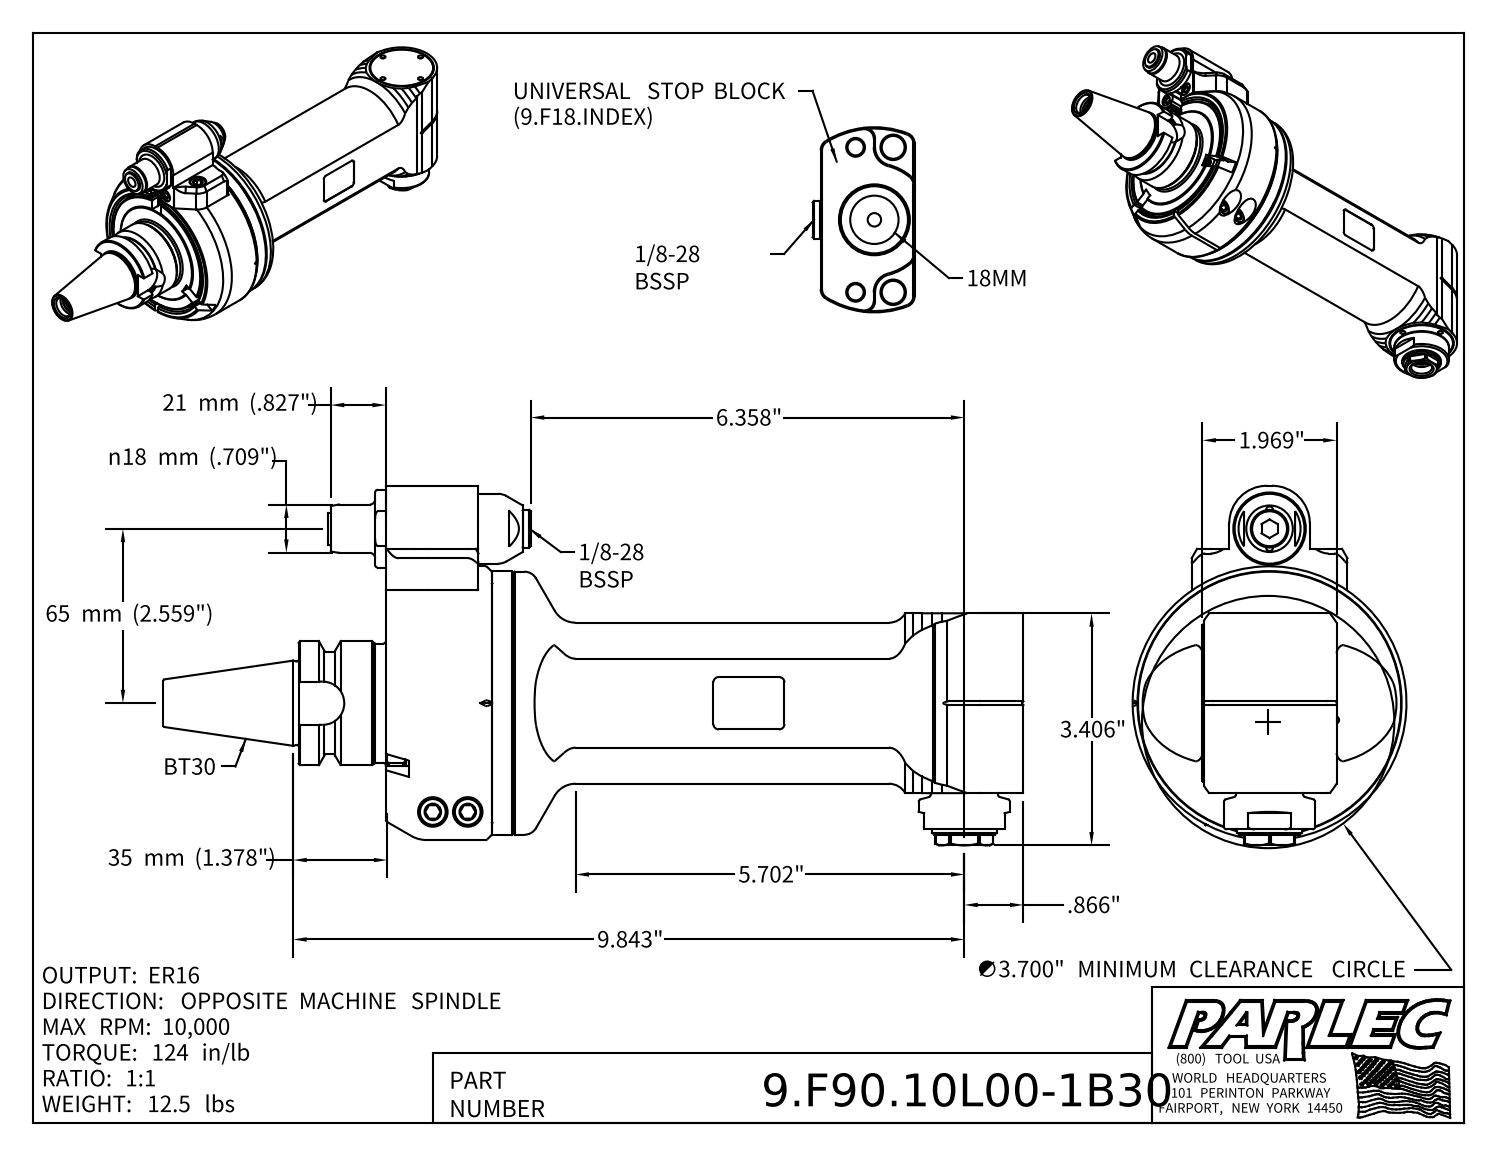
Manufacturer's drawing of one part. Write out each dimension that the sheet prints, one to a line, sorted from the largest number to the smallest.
65 mm (2.559")
35 mm (1.378")
21 mm (.827")
n18 mm (.709")
9.843"
6.358"
5.702"
∅3.700" MINIMUM CLEARANCE CIRCLE
3.406"
1.969"
.866"
